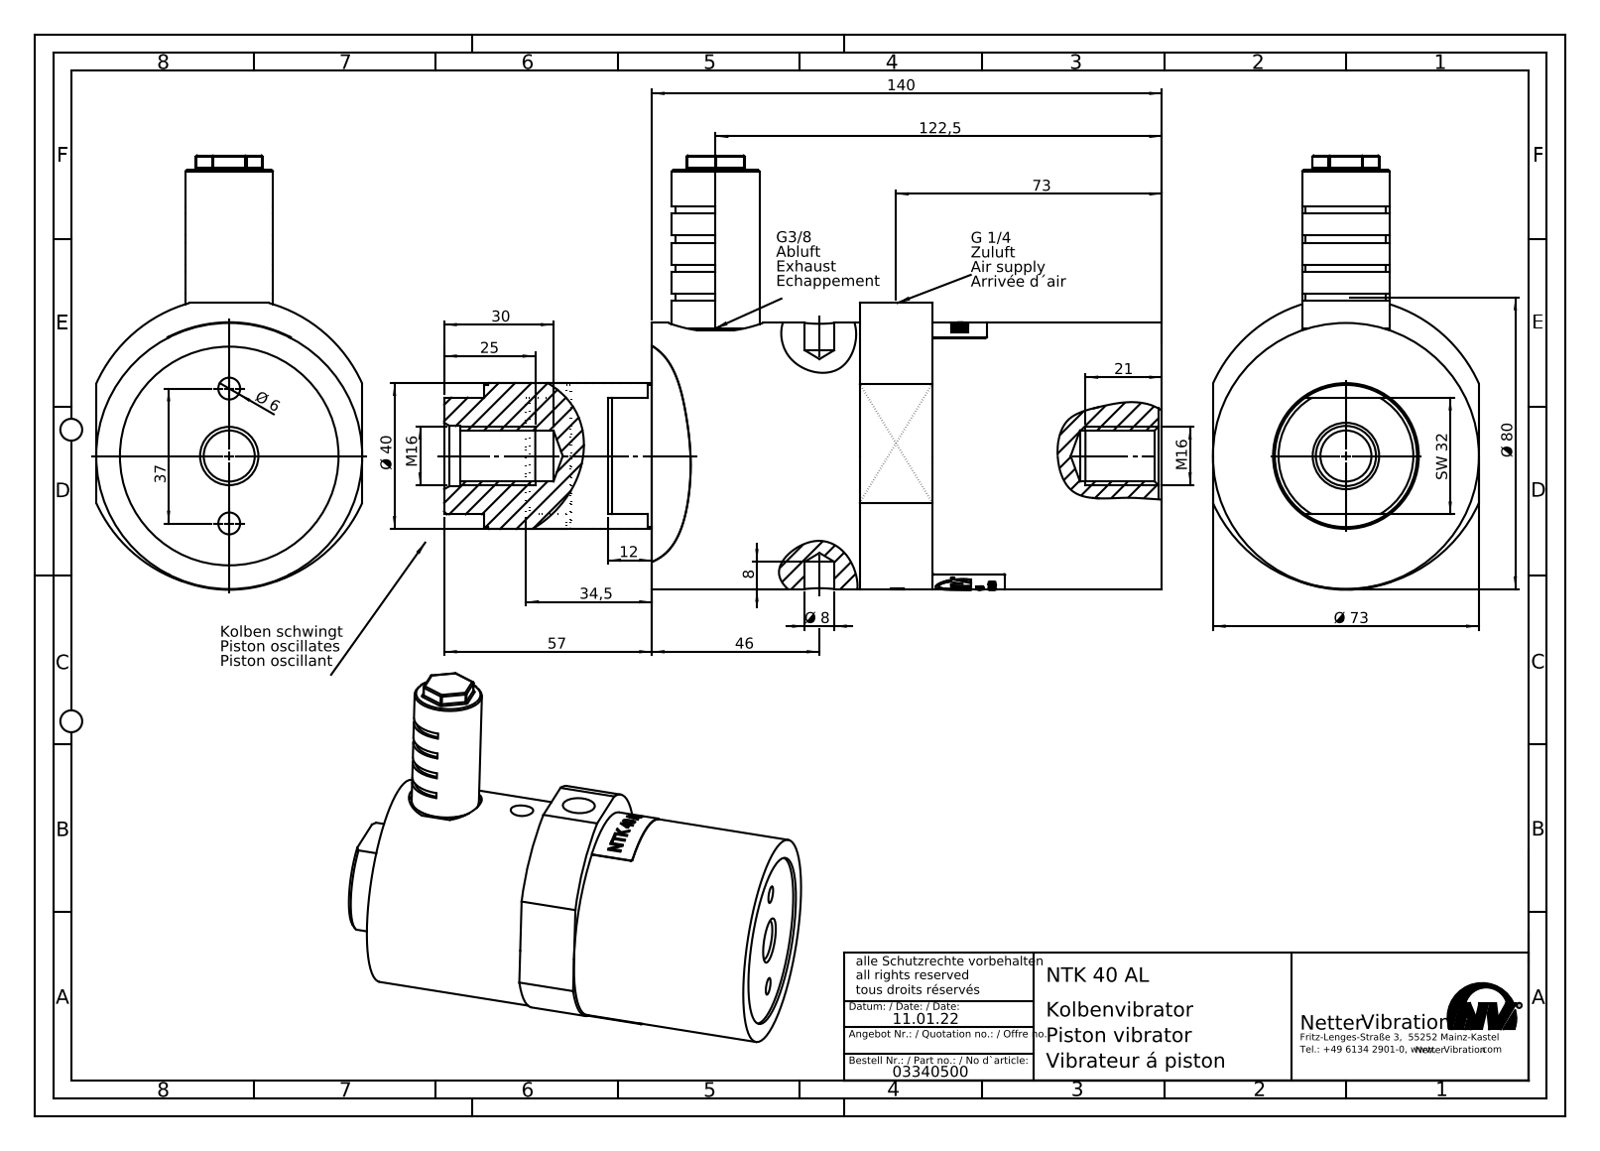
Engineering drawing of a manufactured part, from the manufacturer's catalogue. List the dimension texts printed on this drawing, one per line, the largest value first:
140
122,5
Ø 80
Ø 73
73
57
46
Ø 40
37
34,5
SW 32
30
25
21
M 16
M 16
12
Ø 8
8
Ø 6
